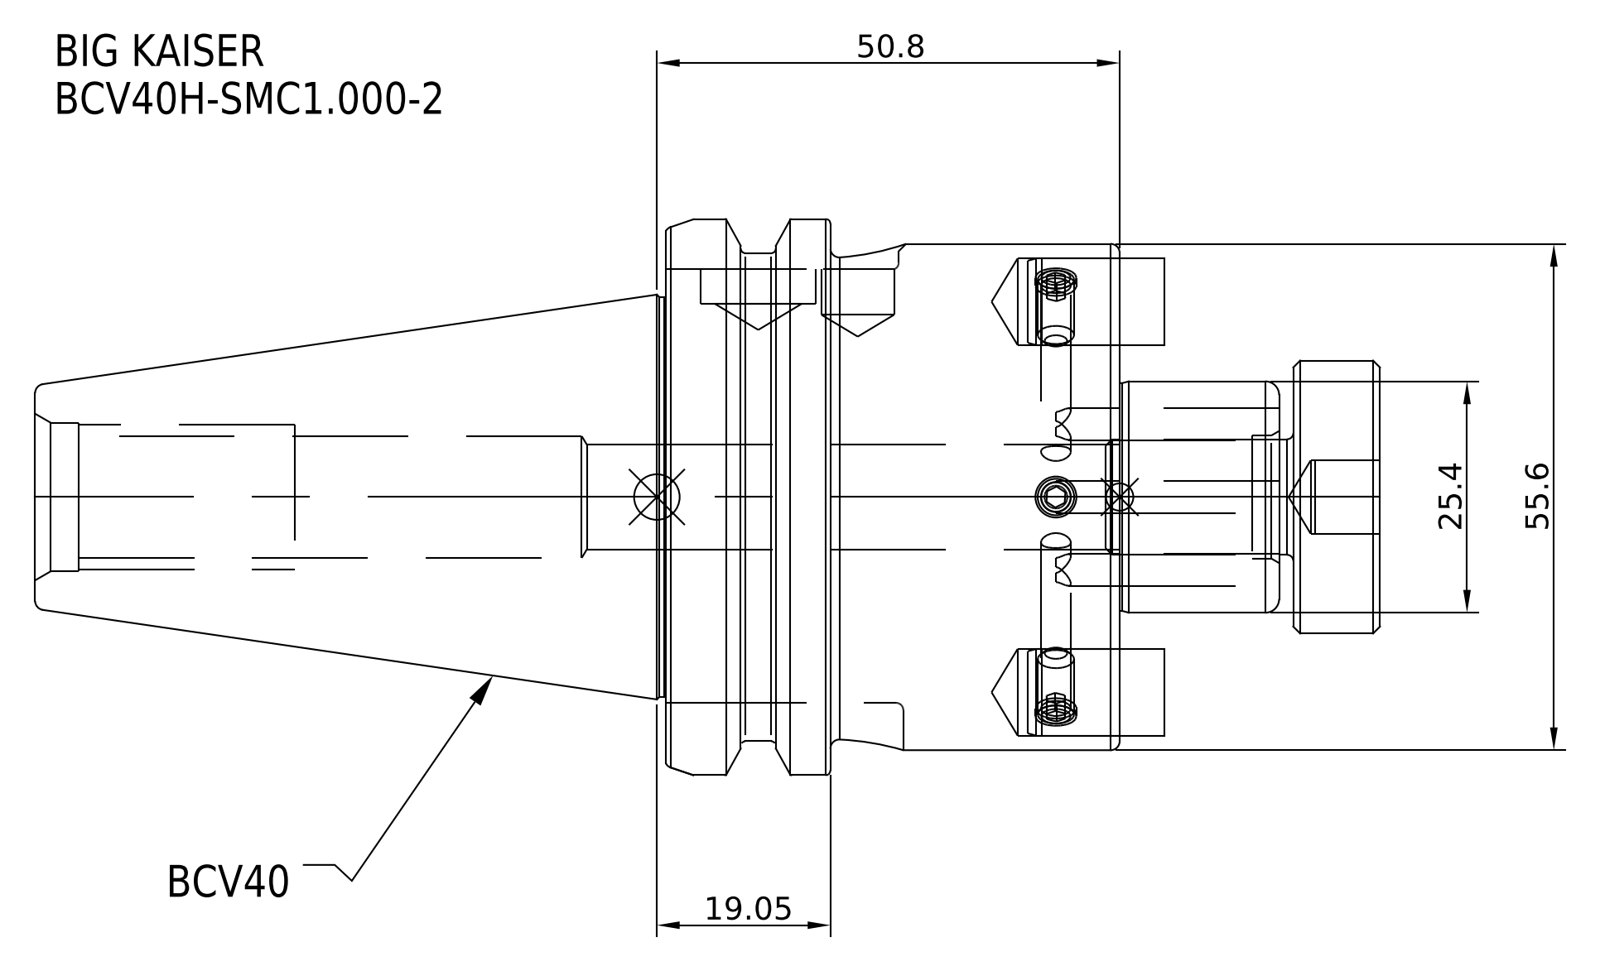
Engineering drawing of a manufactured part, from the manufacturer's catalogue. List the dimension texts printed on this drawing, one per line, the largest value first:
55.6
50.8
25.4
19.05
